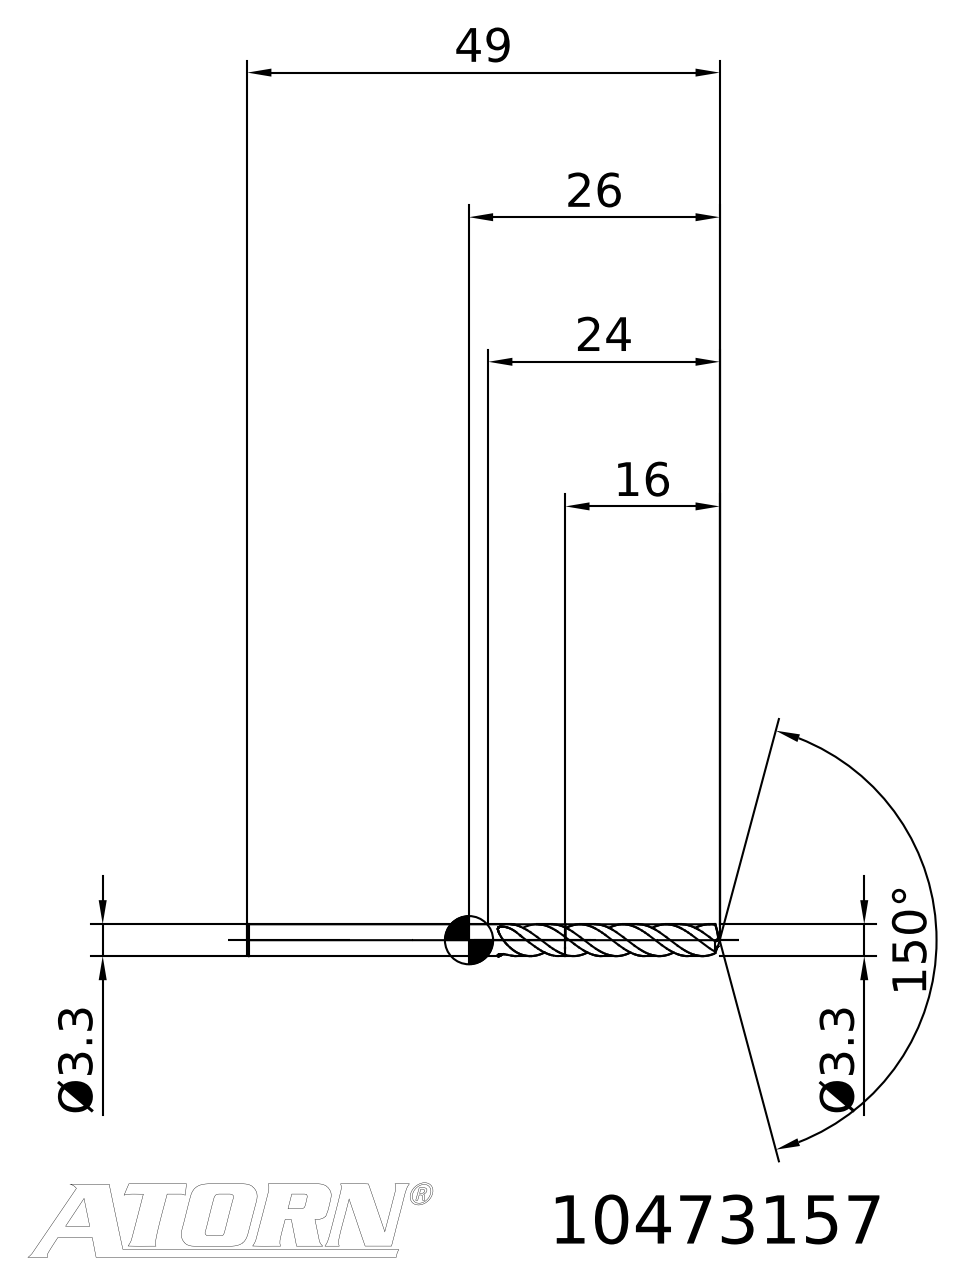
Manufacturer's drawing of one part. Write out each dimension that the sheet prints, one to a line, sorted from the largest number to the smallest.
150°
49
26
24
16
Ø3.3
Ø3.3
